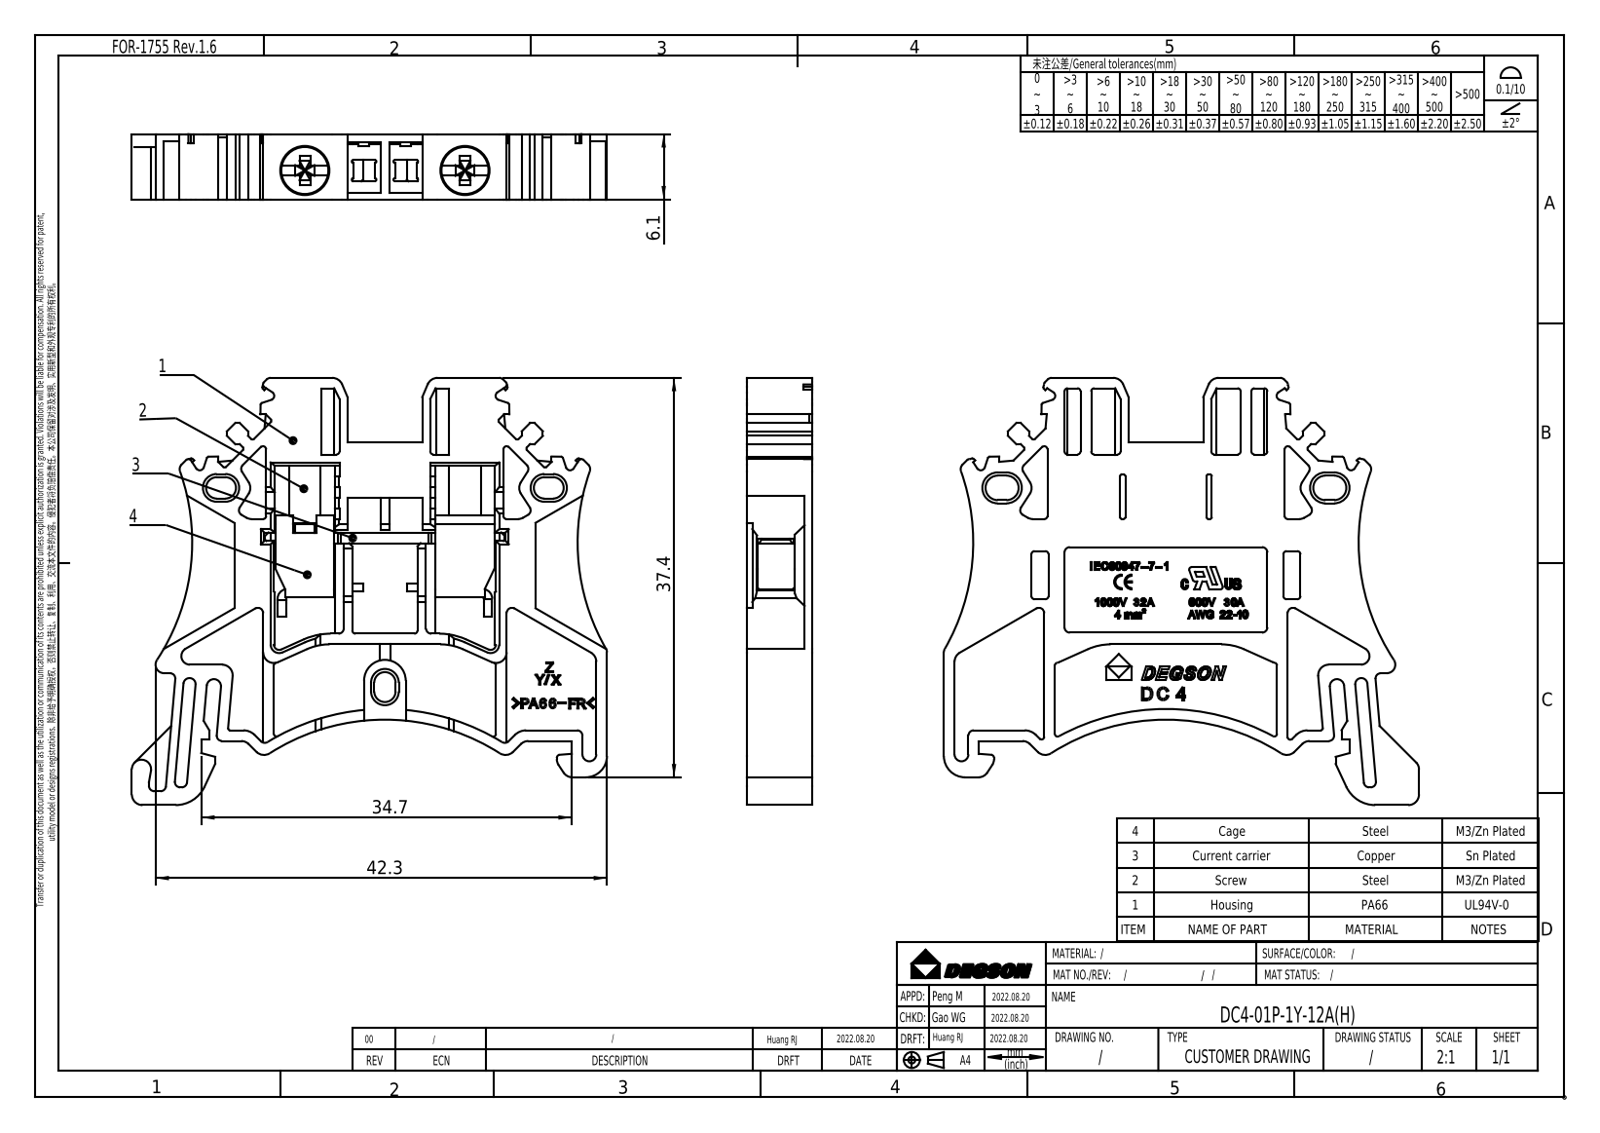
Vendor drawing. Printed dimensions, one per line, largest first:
42.3
37.4
34.7
6.1
